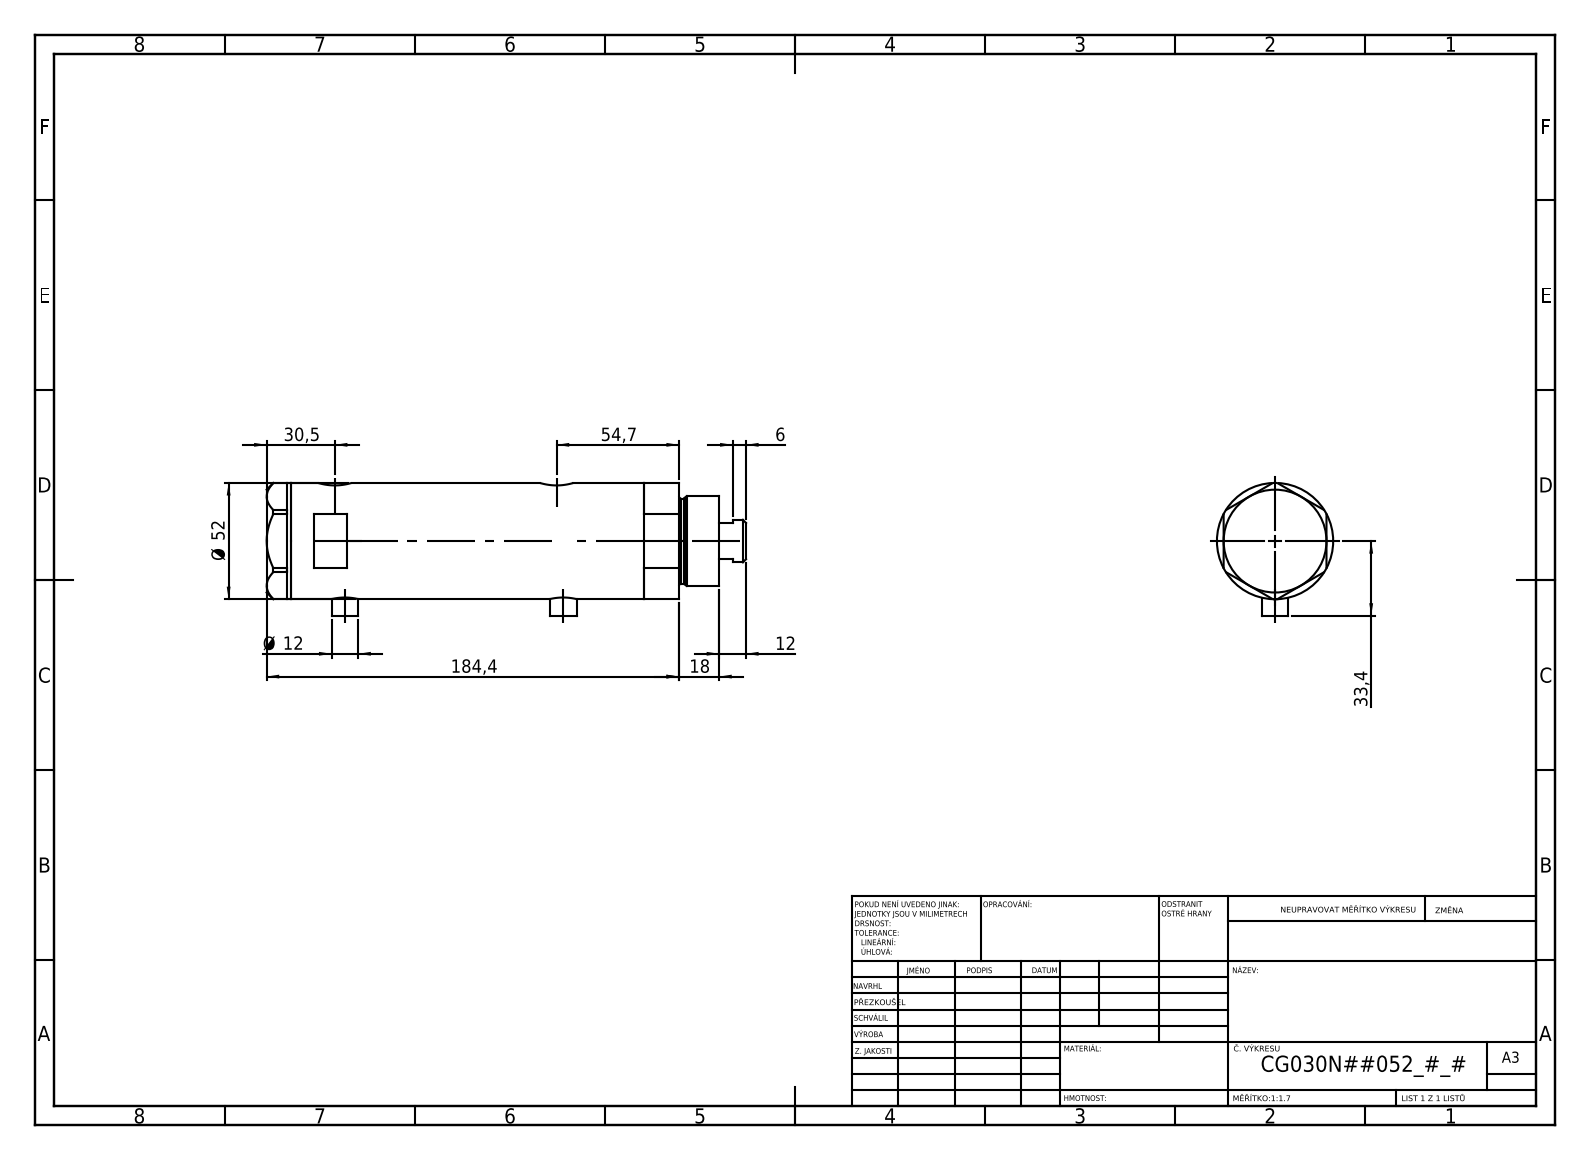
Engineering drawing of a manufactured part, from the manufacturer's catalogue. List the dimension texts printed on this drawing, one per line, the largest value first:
184,4
54,7
Ø 52
33,4
30,5
18
12
Ø 12
6
